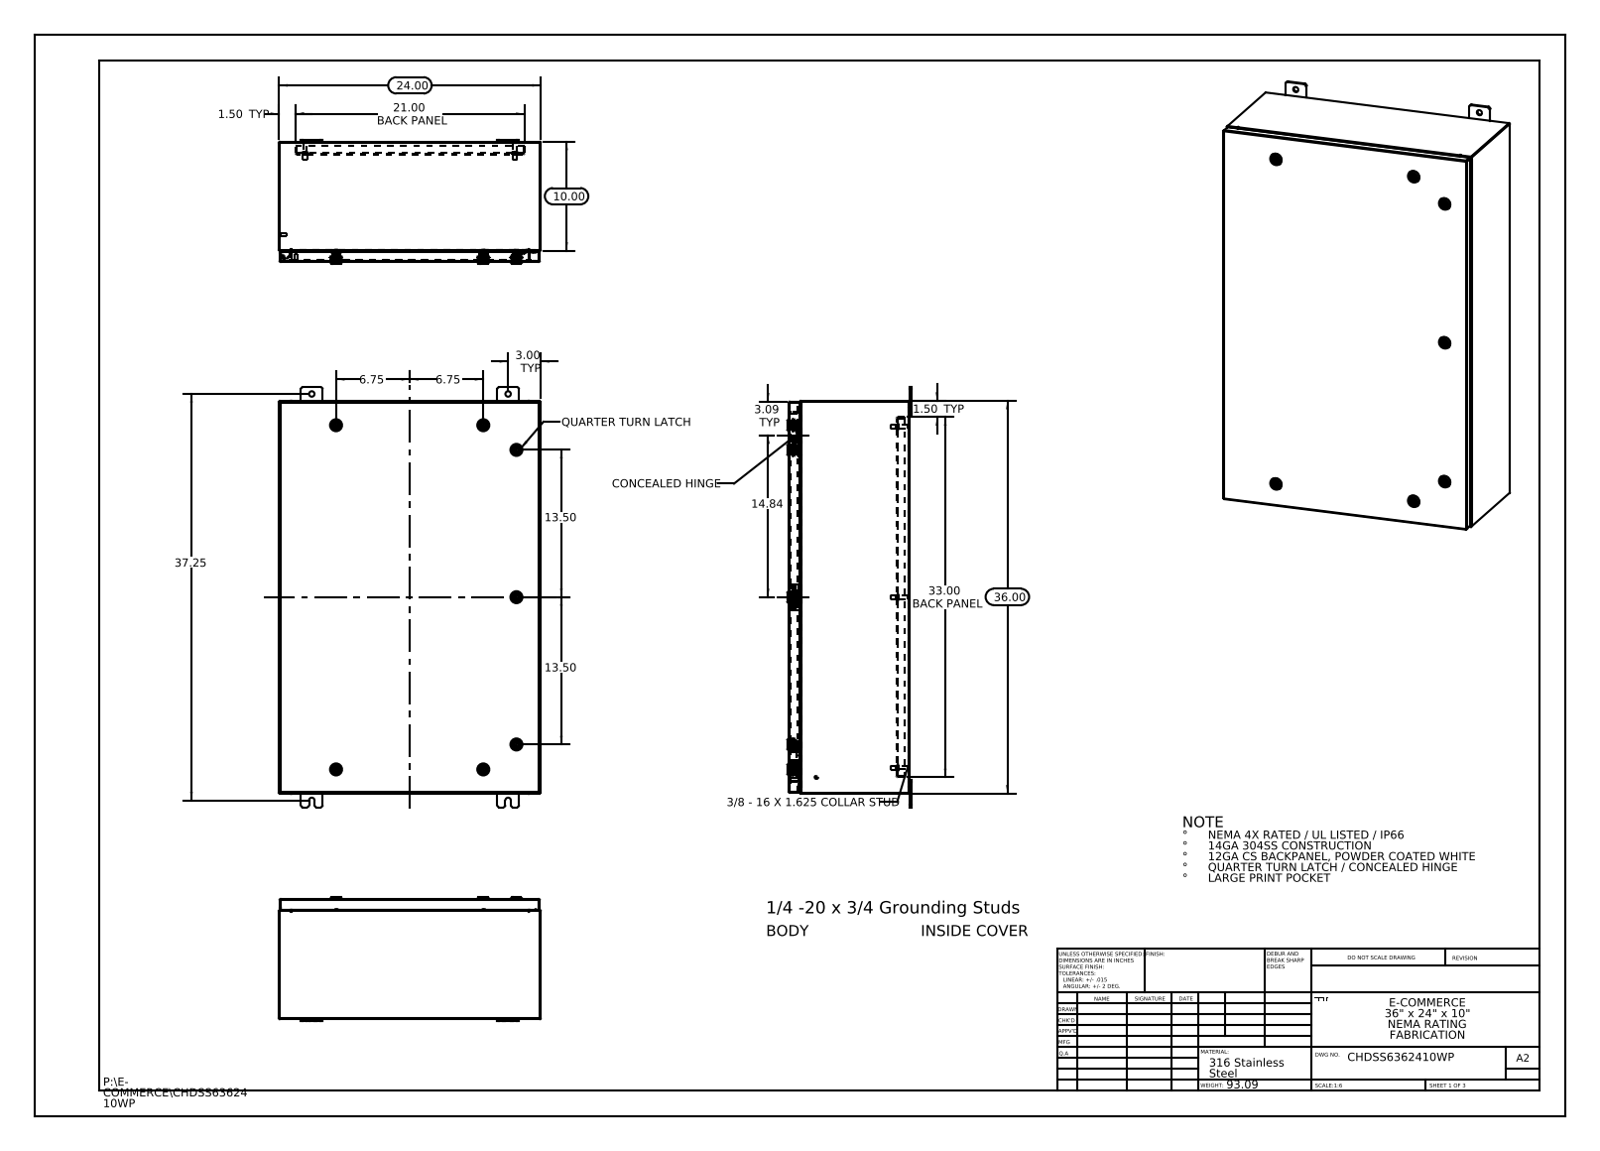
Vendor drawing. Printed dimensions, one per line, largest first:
37.25
36.00
33.00 BACK PANEL
24.00
21.00 BACK PANEL
14.84
13.50
13.50
10.00
6.75
6.75
3.09 TYP
3.00 TYP
1.50 TYP
1.50 TYP
